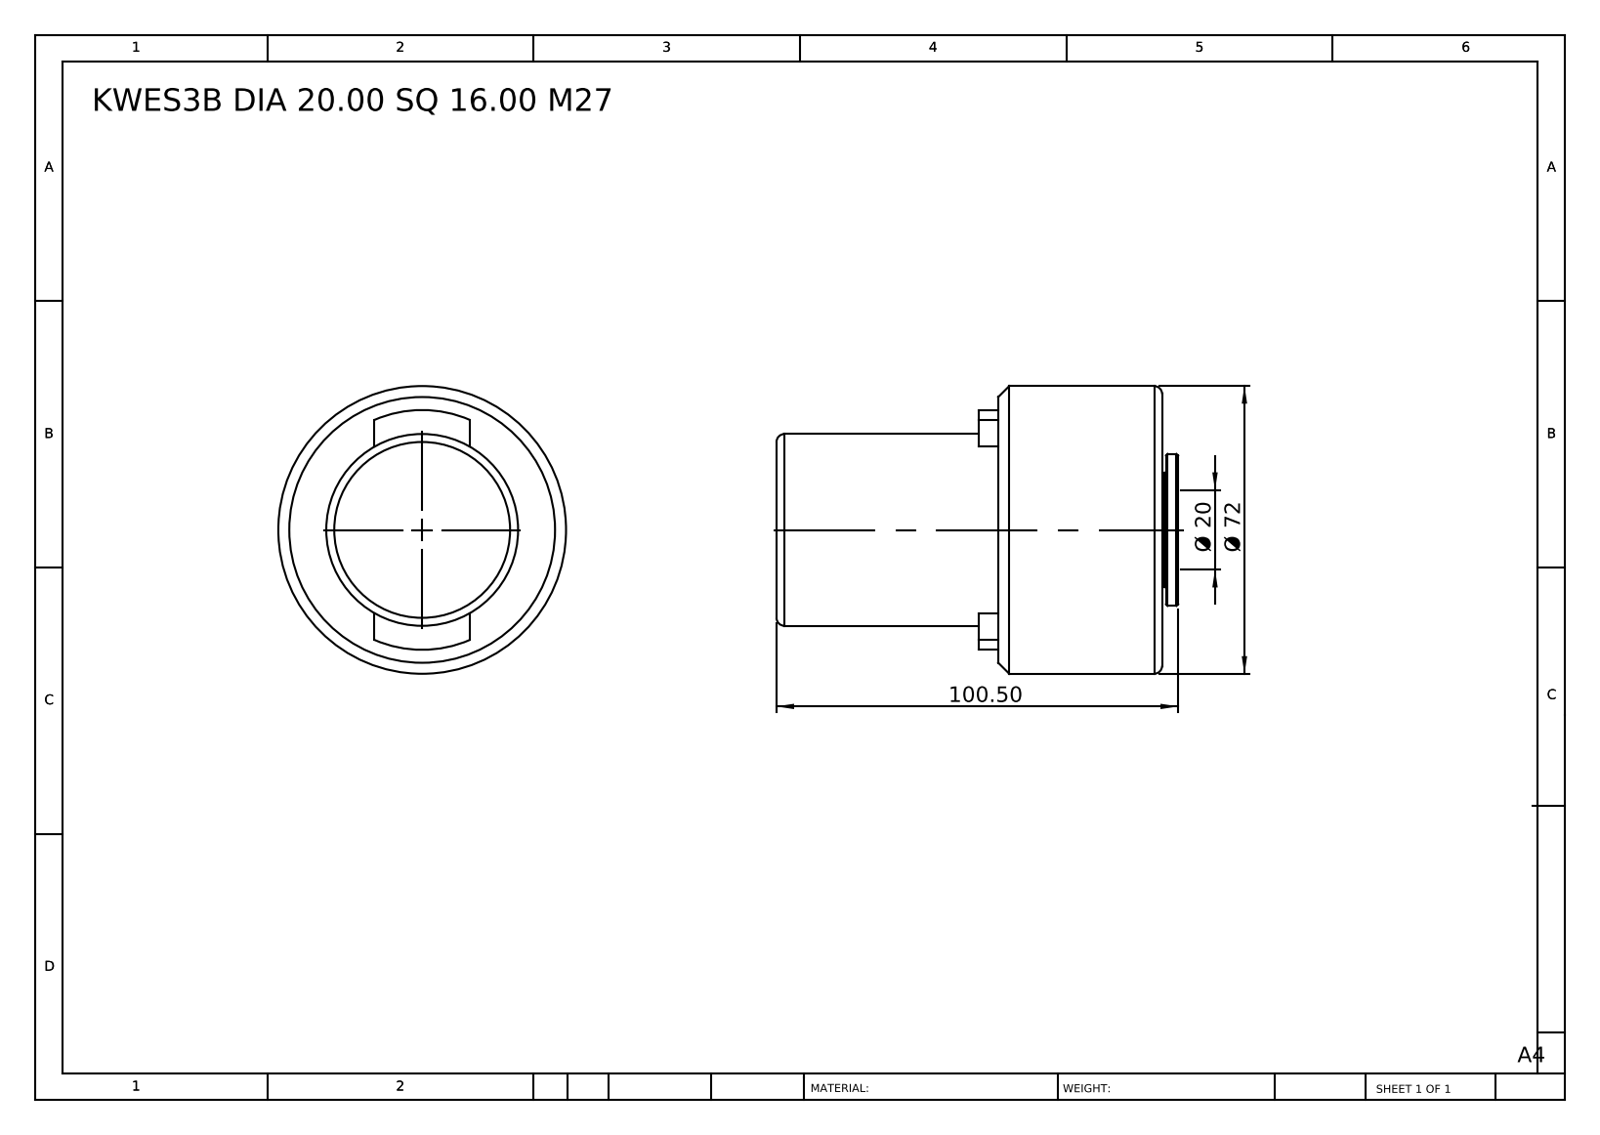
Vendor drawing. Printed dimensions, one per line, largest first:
100.50
Ø 72
Ø 20
